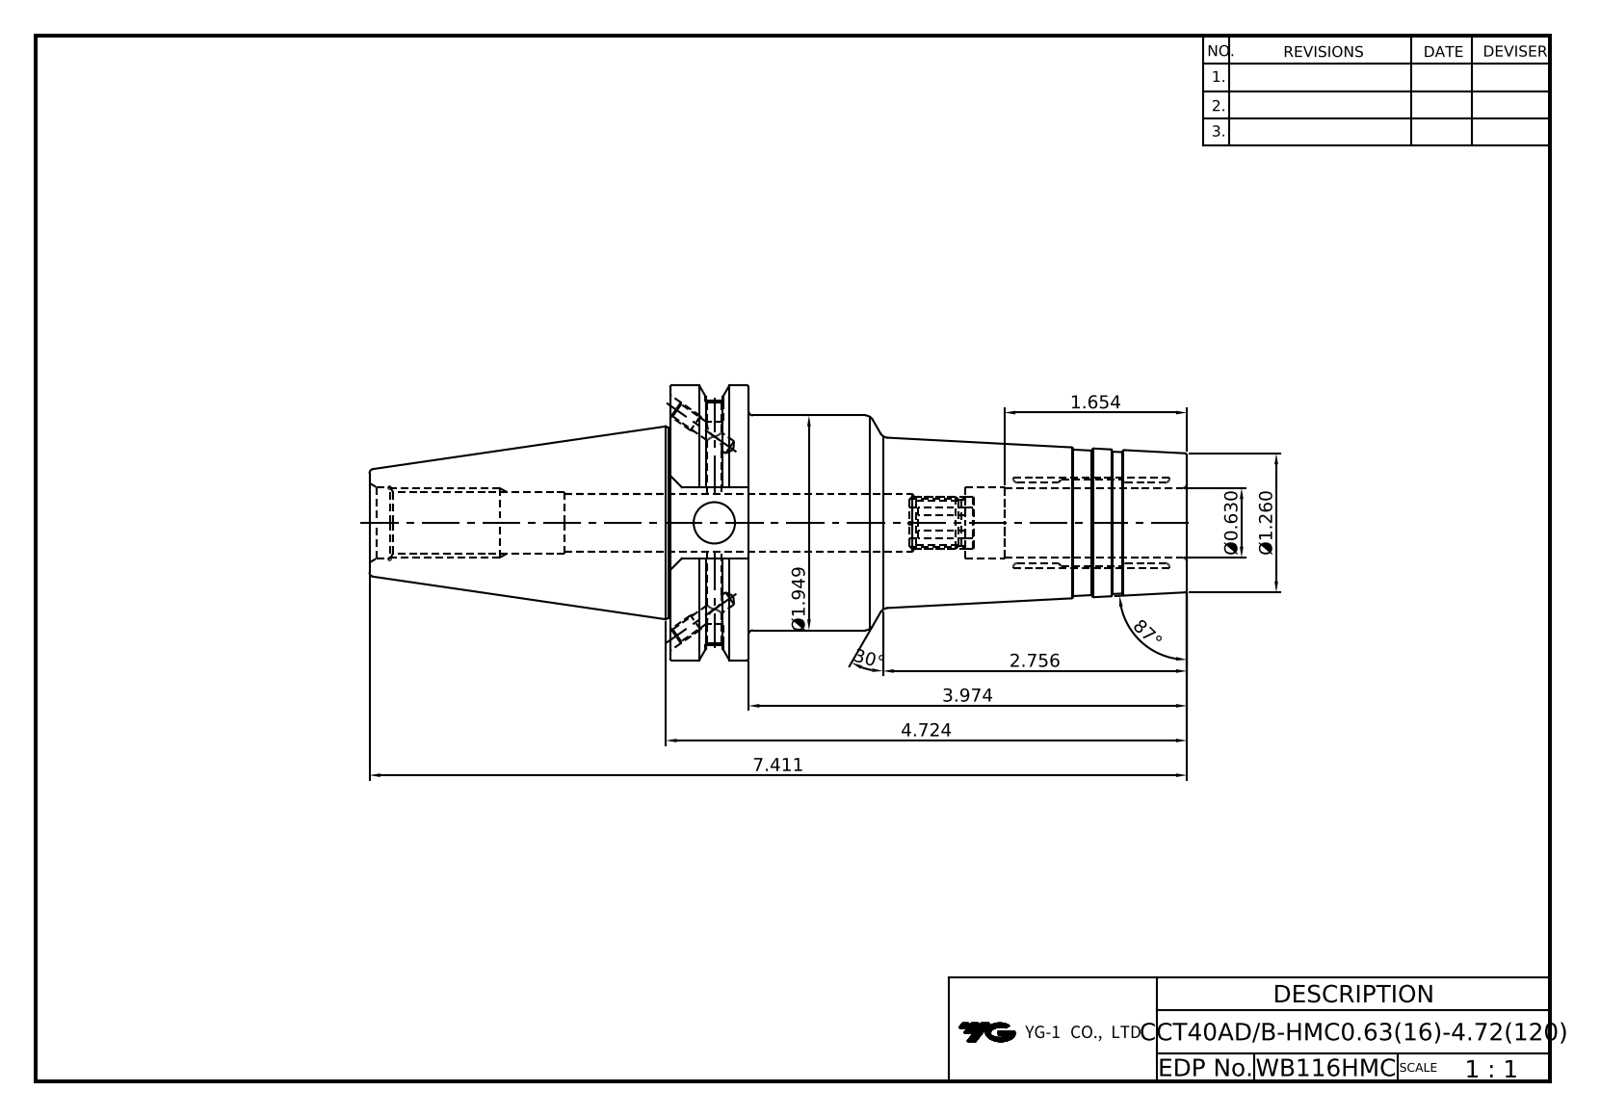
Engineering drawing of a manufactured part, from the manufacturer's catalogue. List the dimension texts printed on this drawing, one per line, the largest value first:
87°
30°
7.411
4.724
3.974
2.756
Ø1.949
1.654
Ø1.260
Ø0.630
